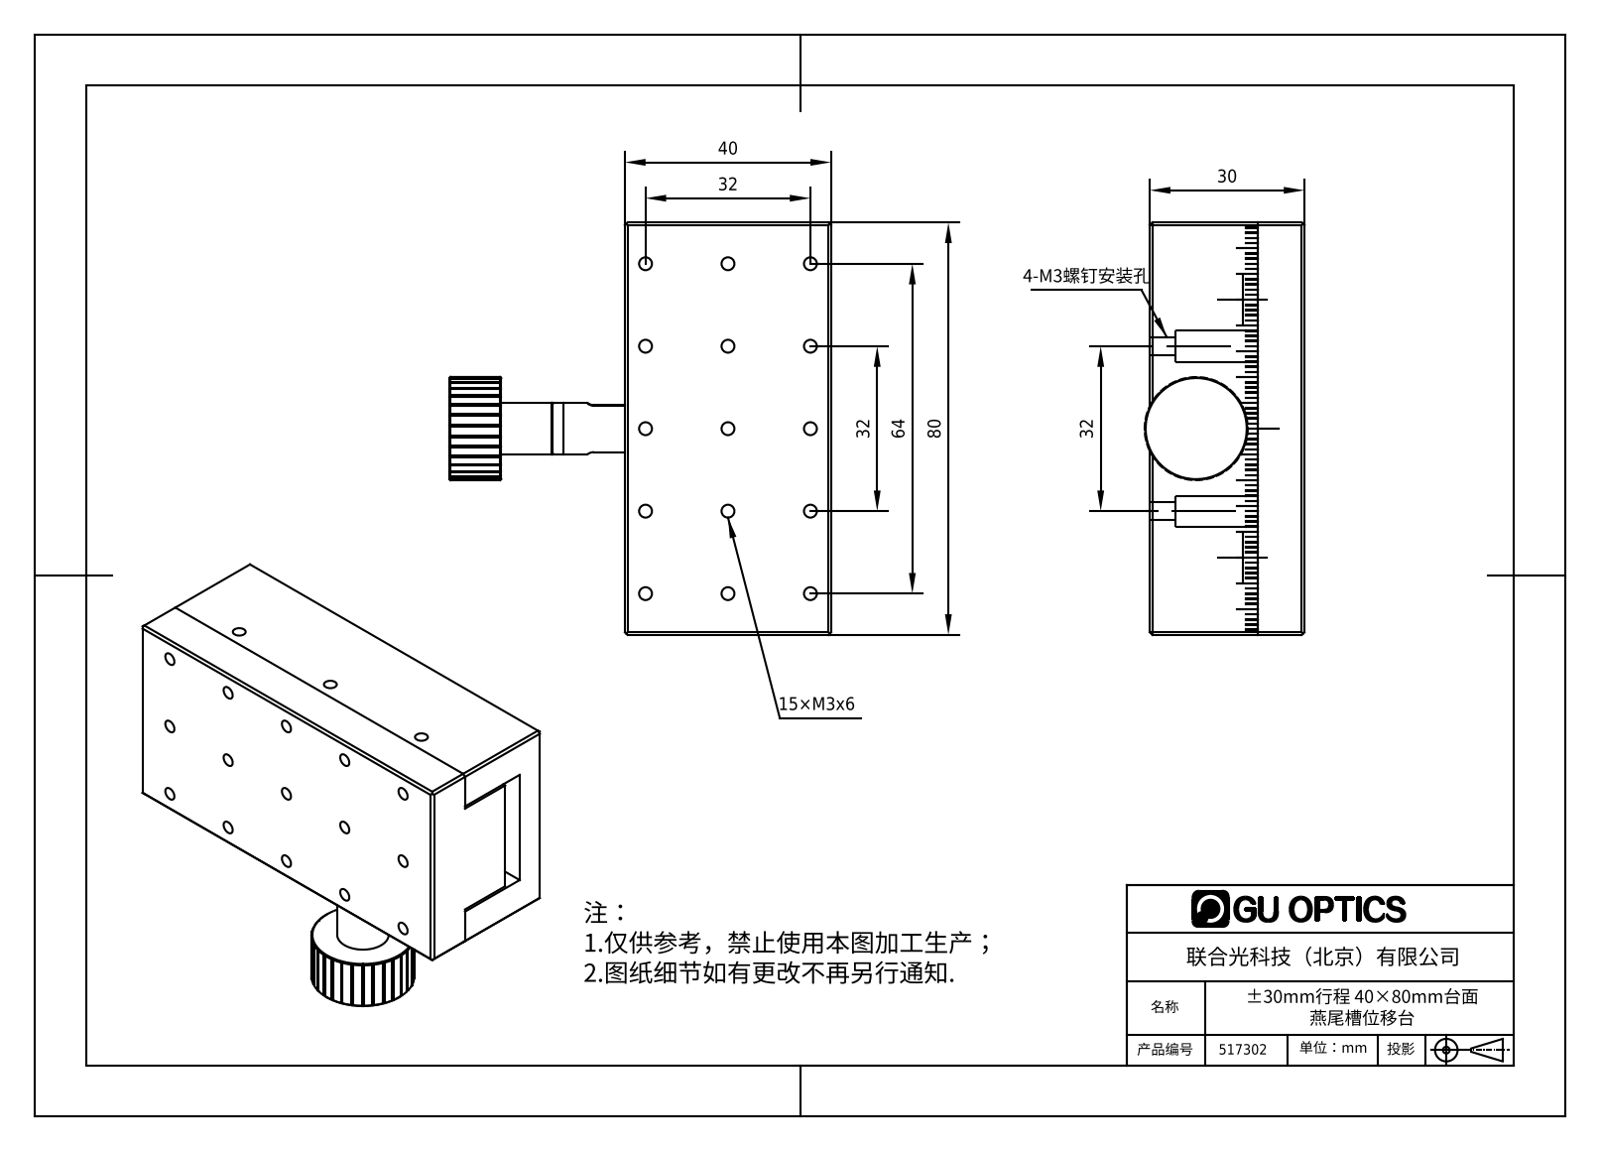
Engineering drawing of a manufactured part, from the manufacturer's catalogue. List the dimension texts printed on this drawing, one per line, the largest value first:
80
64
40
32
32
32
30
